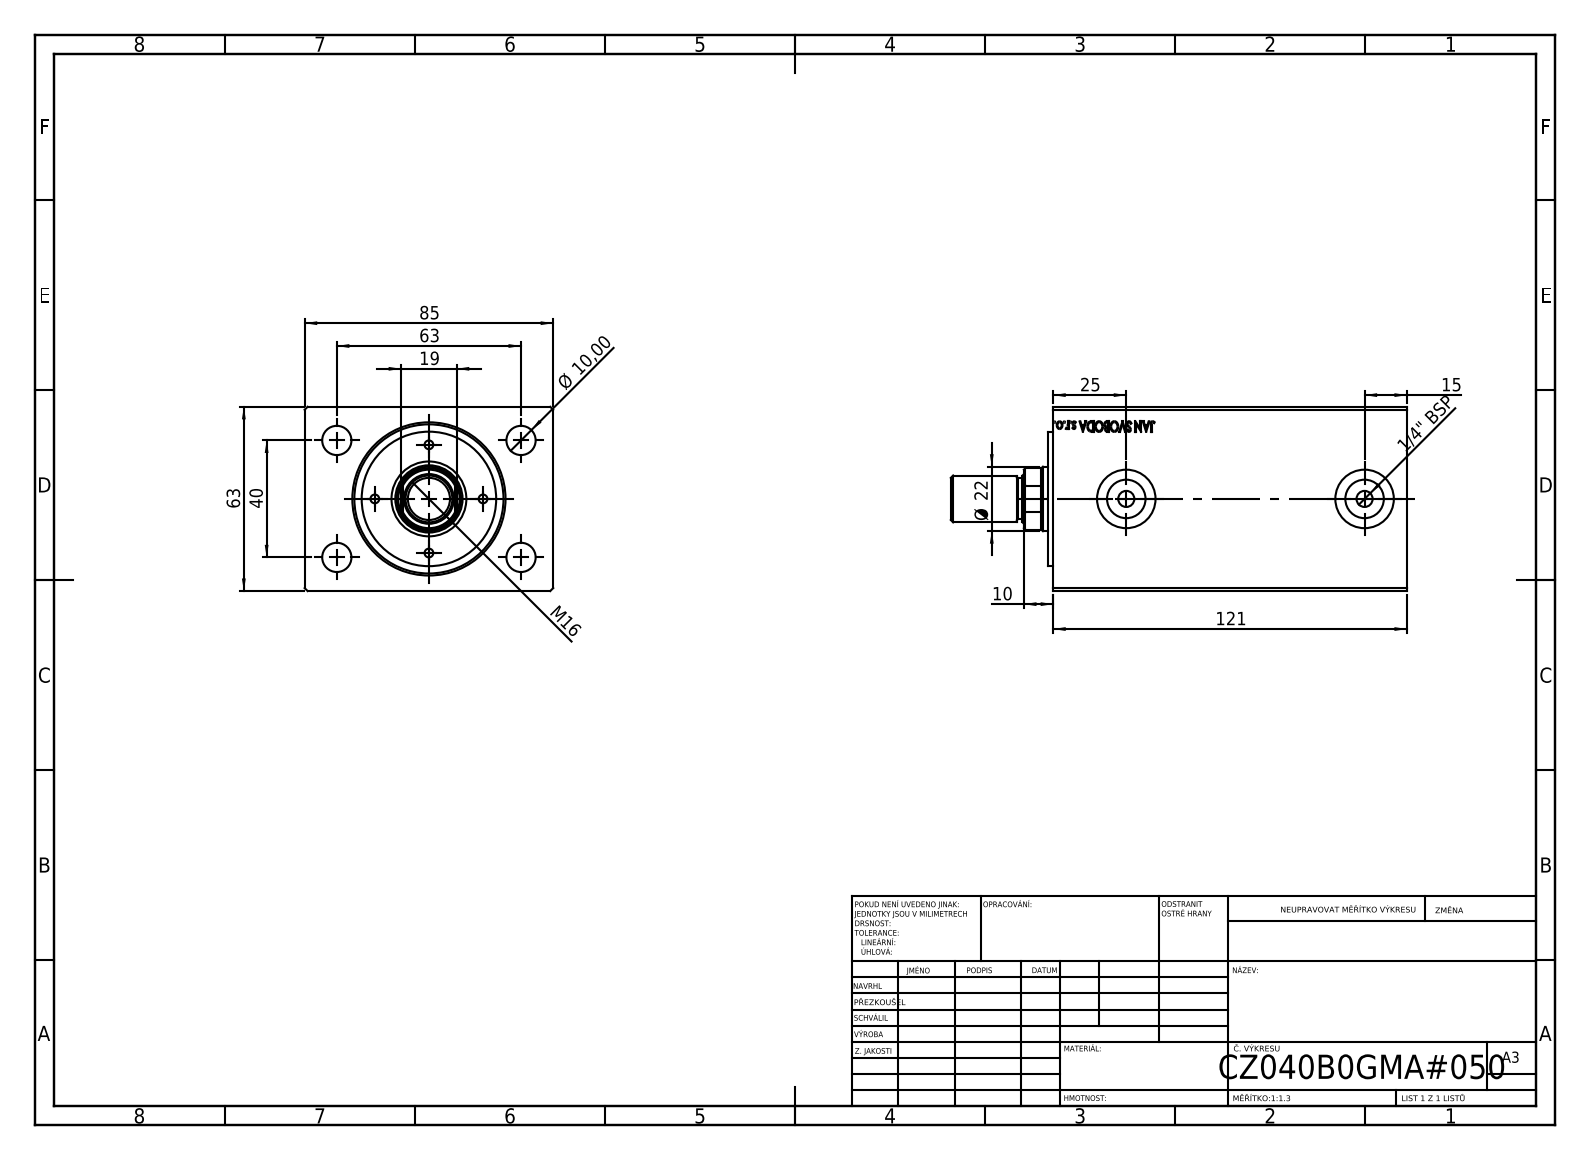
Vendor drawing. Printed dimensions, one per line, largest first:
121
85
63
63
40
25
Ø 22
19
M16
15
Ø 10,00
10
1/4" BSP
